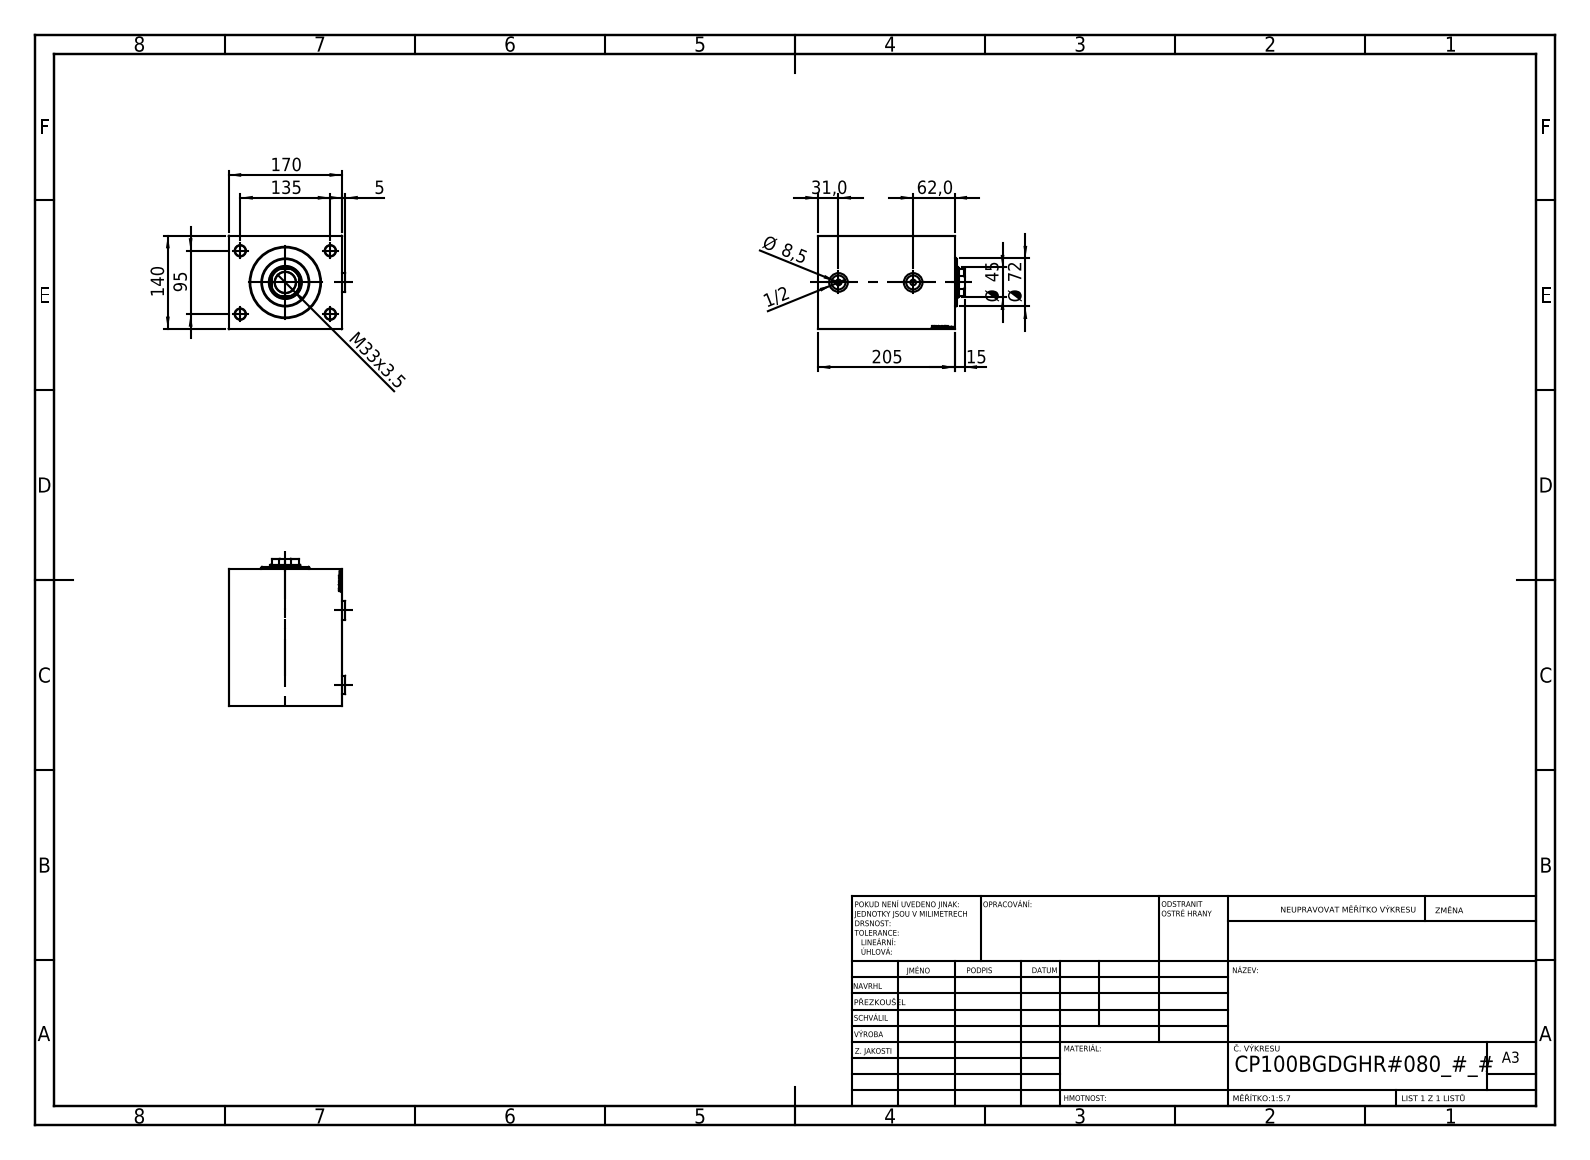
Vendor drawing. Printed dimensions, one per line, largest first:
205
170
140
135
95
Ø 72
62,0
Ø 45
M33x3.5
31,0
15
Ø 8,5
5
1/2
